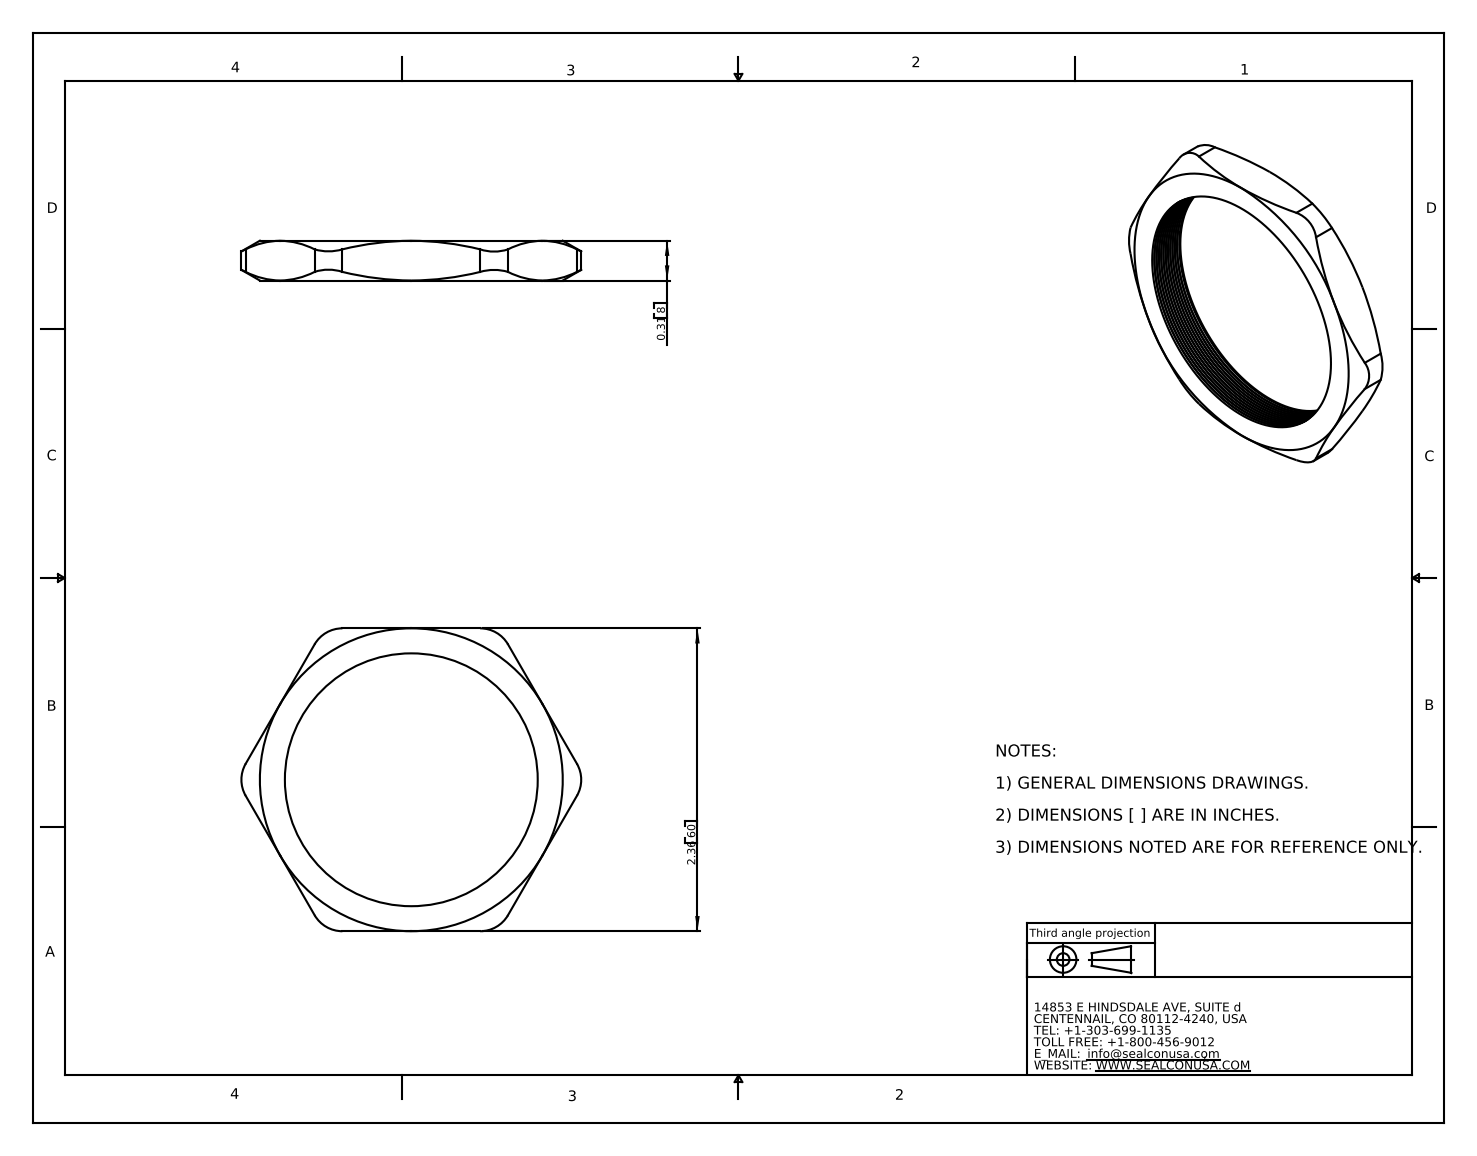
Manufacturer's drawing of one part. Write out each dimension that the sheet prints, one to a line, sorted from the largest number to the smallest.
2.36 60
0.31 8
